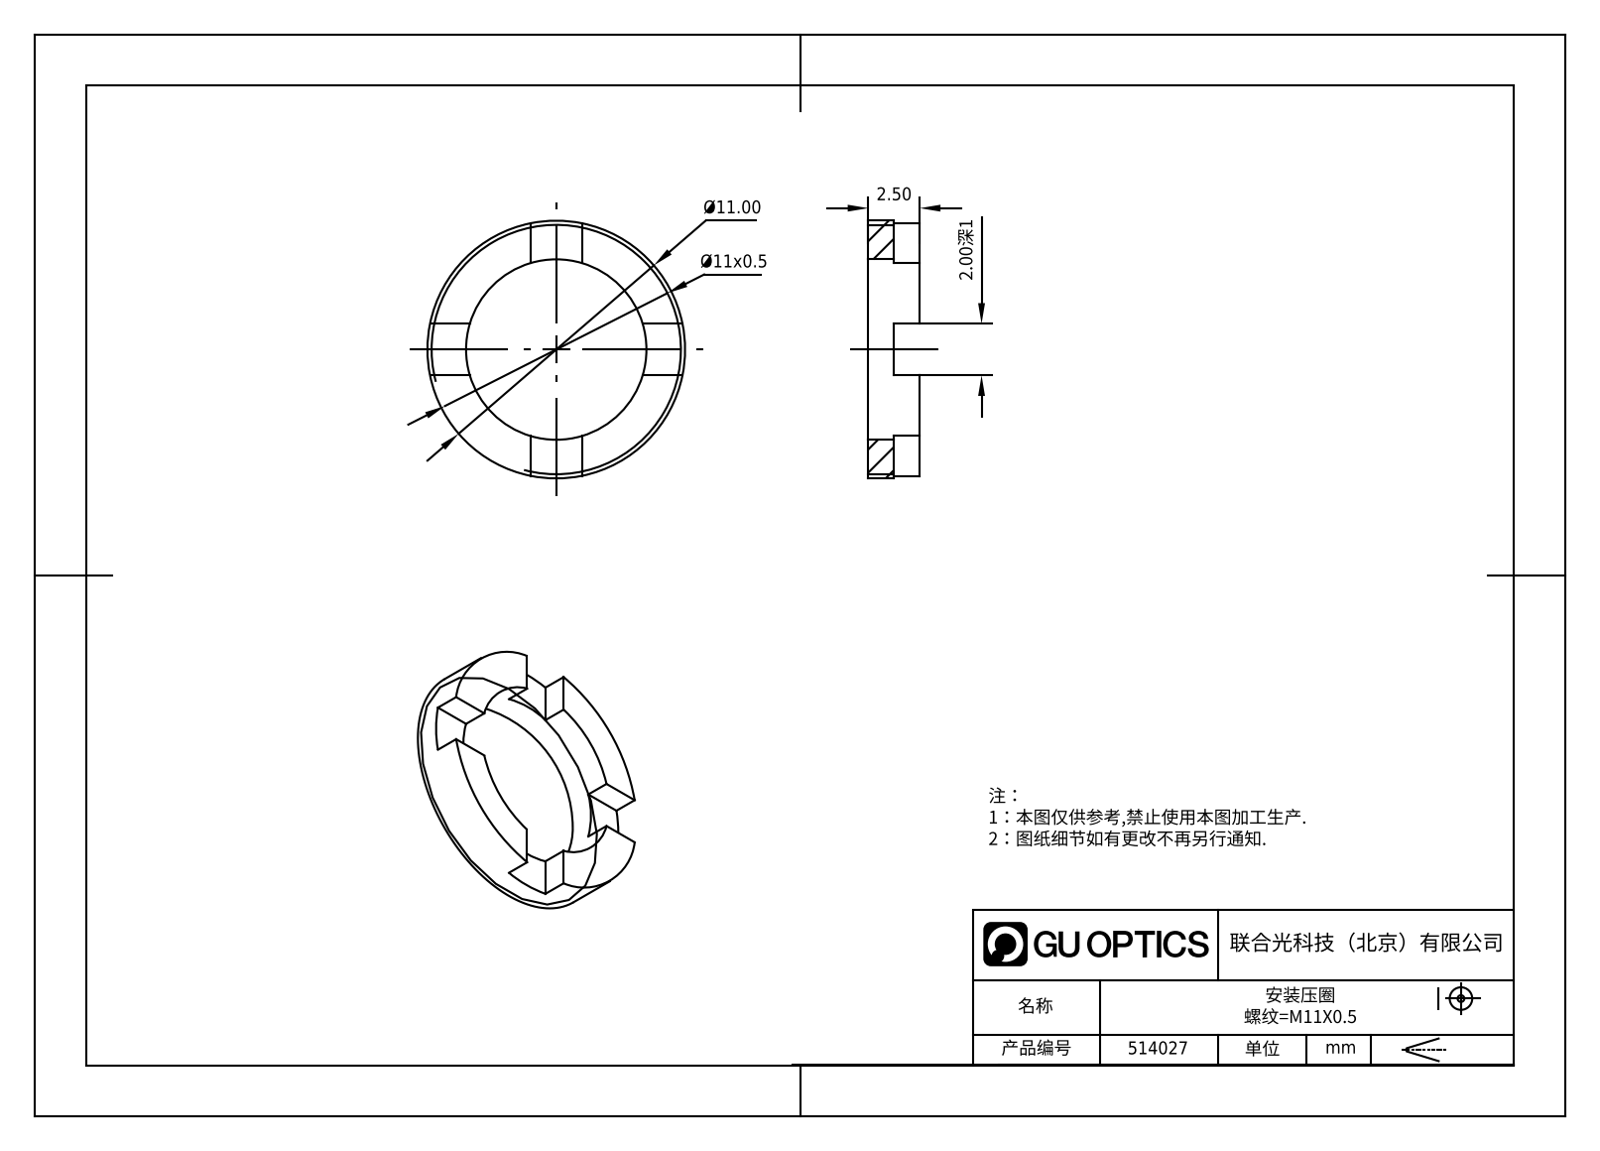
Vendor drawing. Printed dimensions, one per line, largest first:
Ø11.00
Ø11x0.5
2.50
2.00深1
